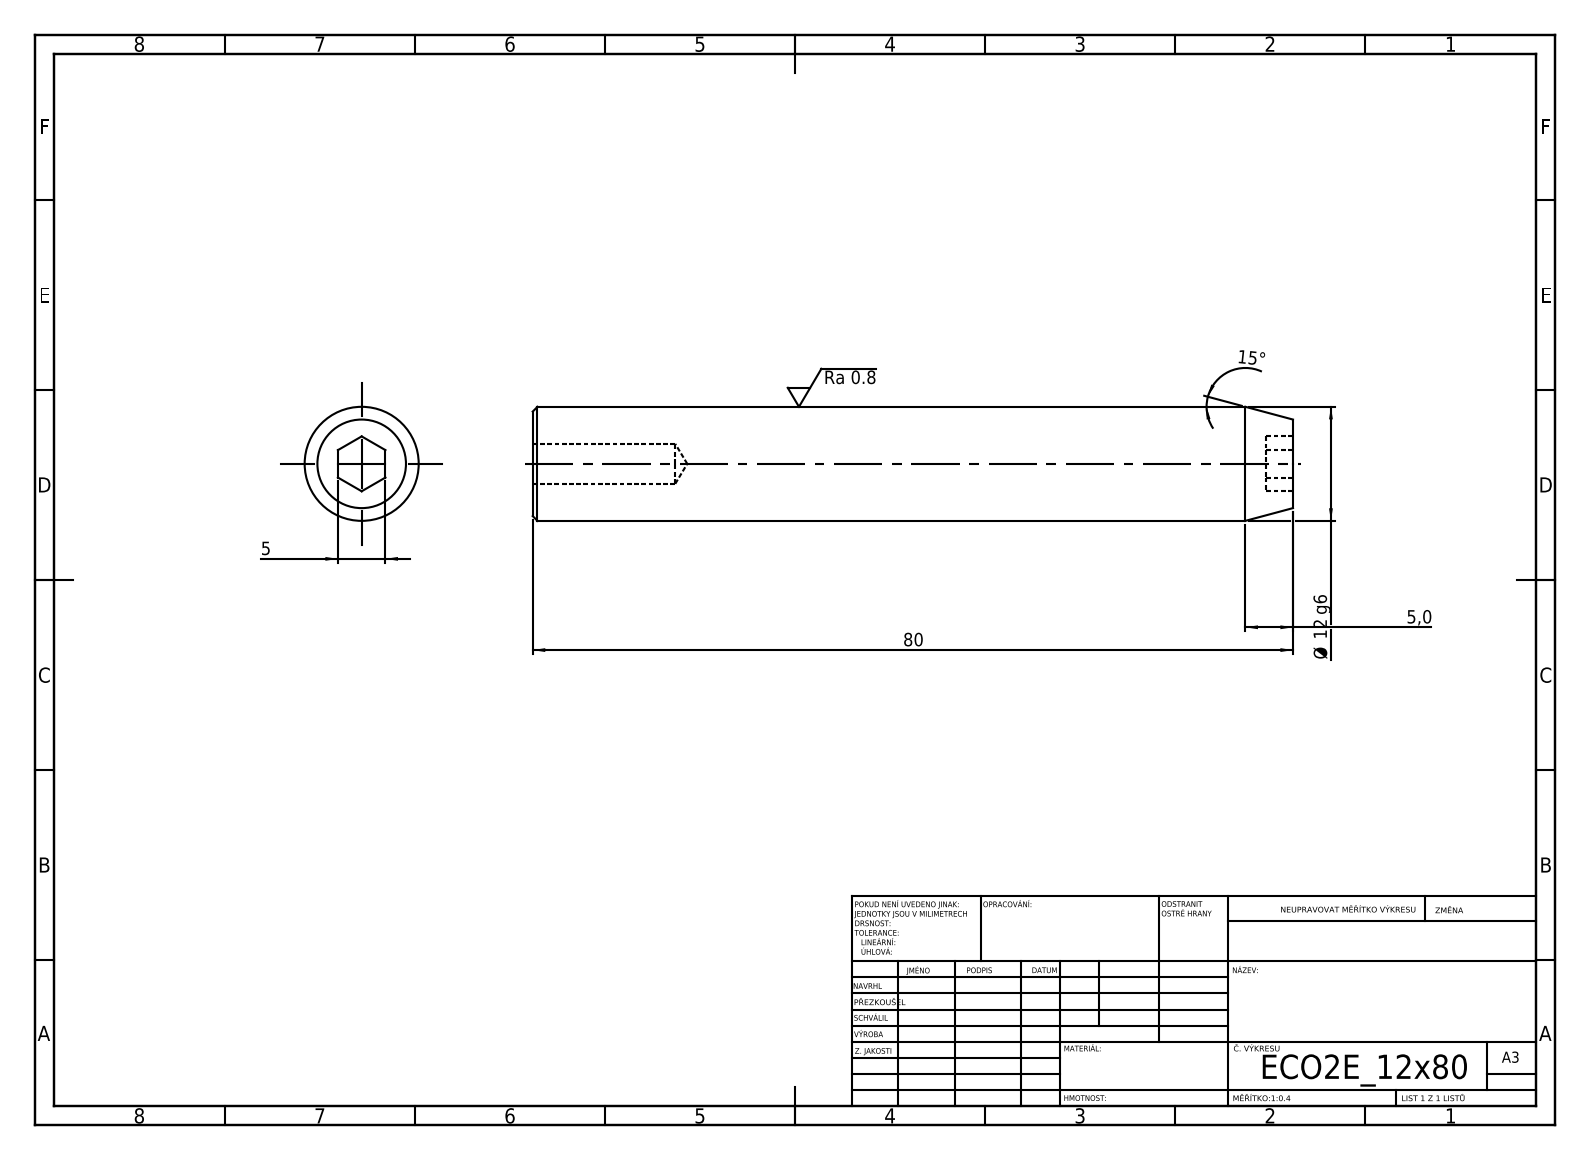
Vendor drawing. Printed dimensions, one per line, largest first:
80
15°
Ø 12 g6
5,0
5
